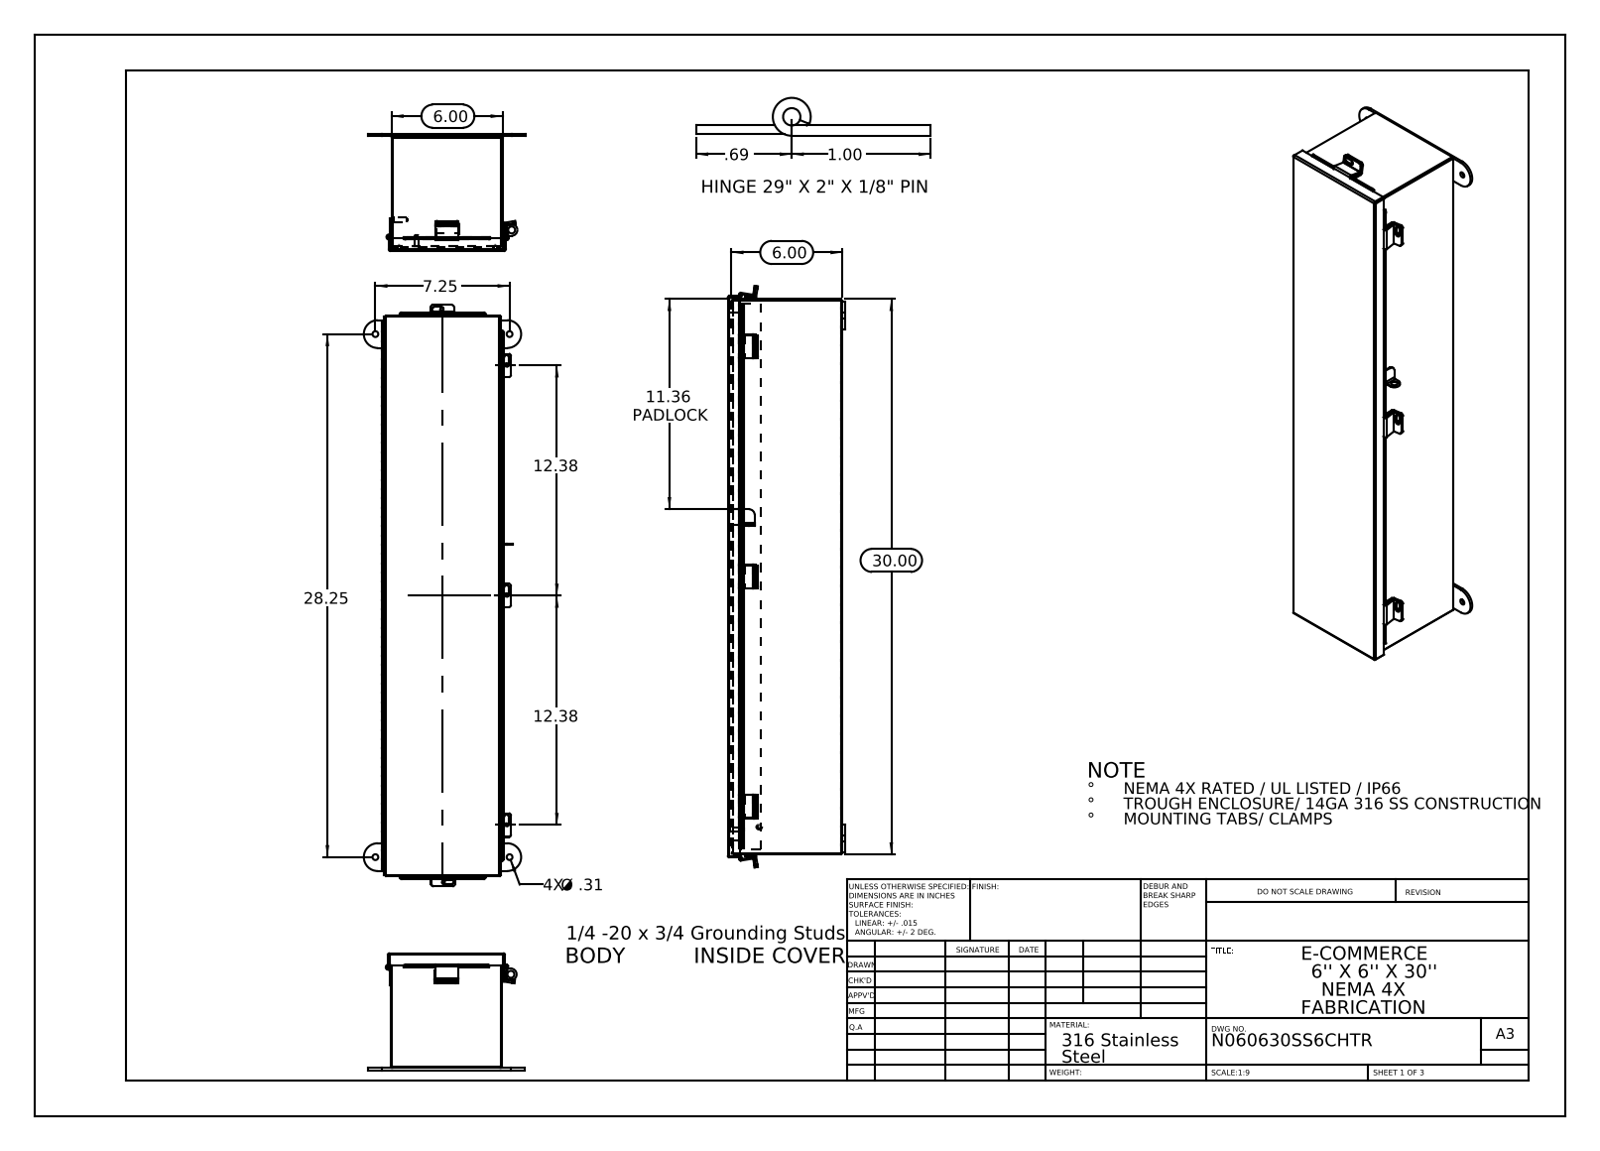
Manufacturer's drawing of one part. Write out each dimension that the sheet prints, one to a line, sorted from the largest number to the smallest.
30.00
28.25
12.38
12.38
11.36 PADLOCK
7.25
6.00
6.00
1.00
.69
4X Ø .31
